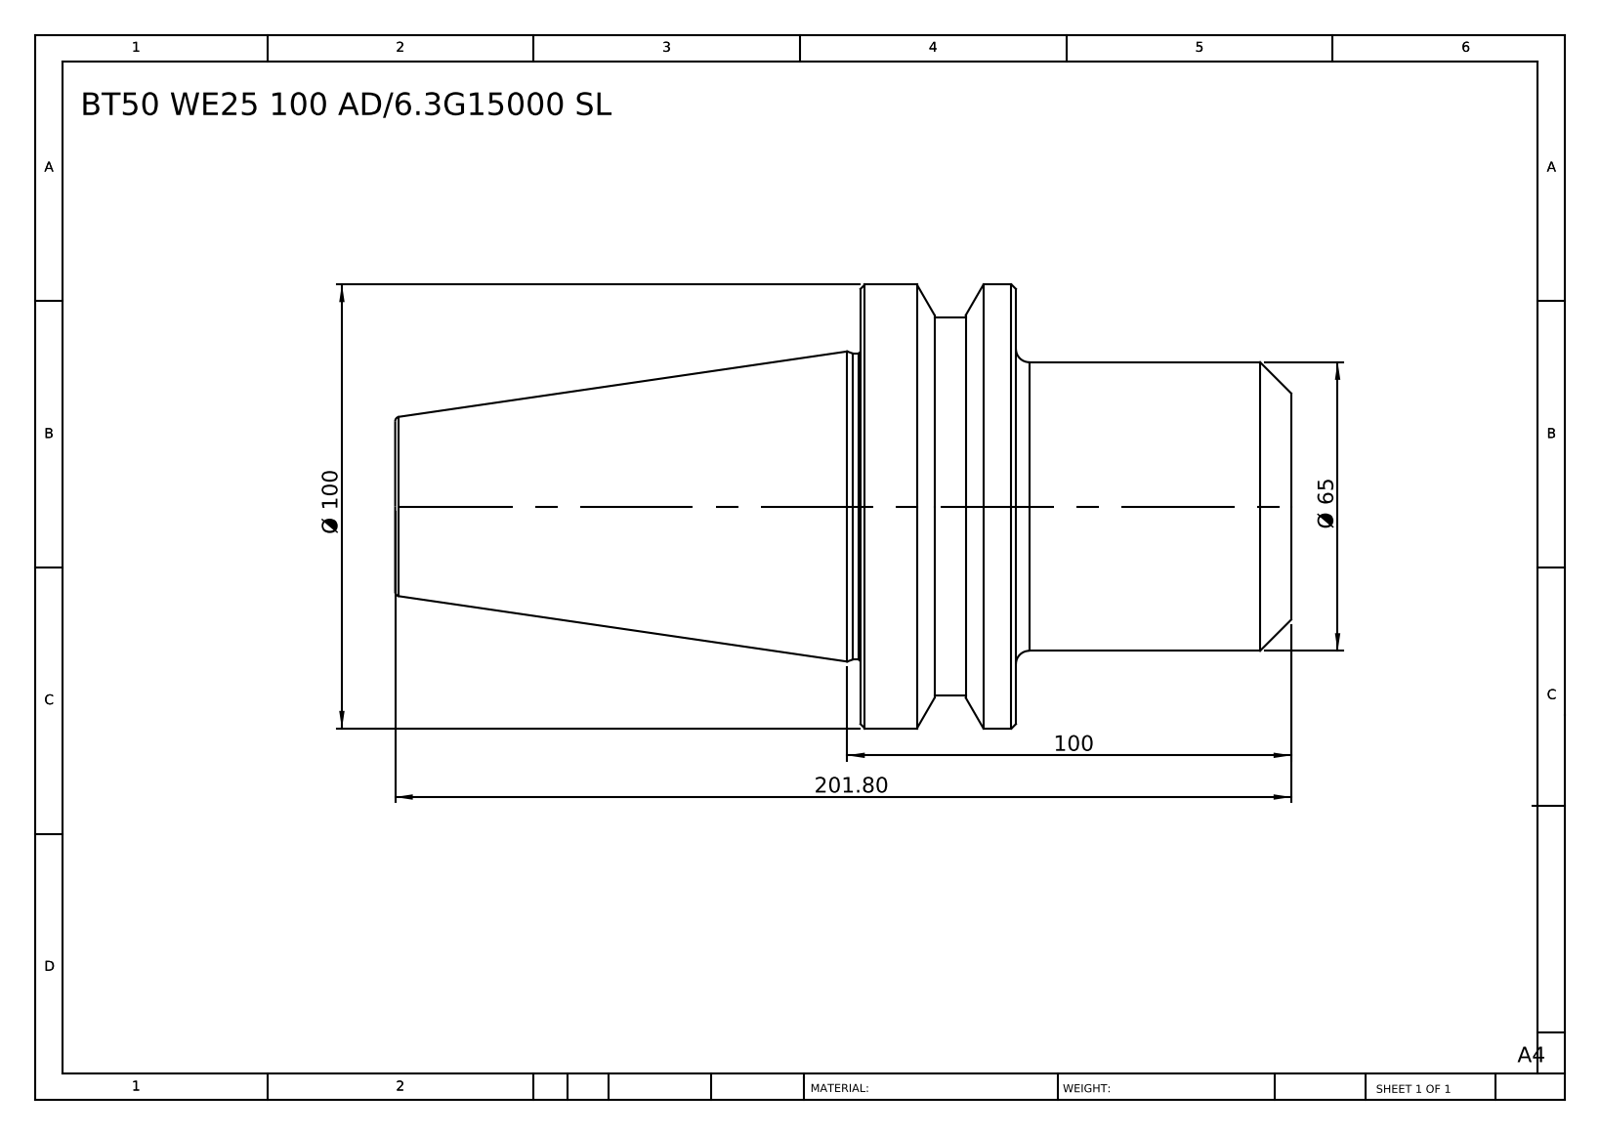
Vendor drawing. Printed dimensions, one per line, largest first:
201.80
100
Ø 100
Ø 65
